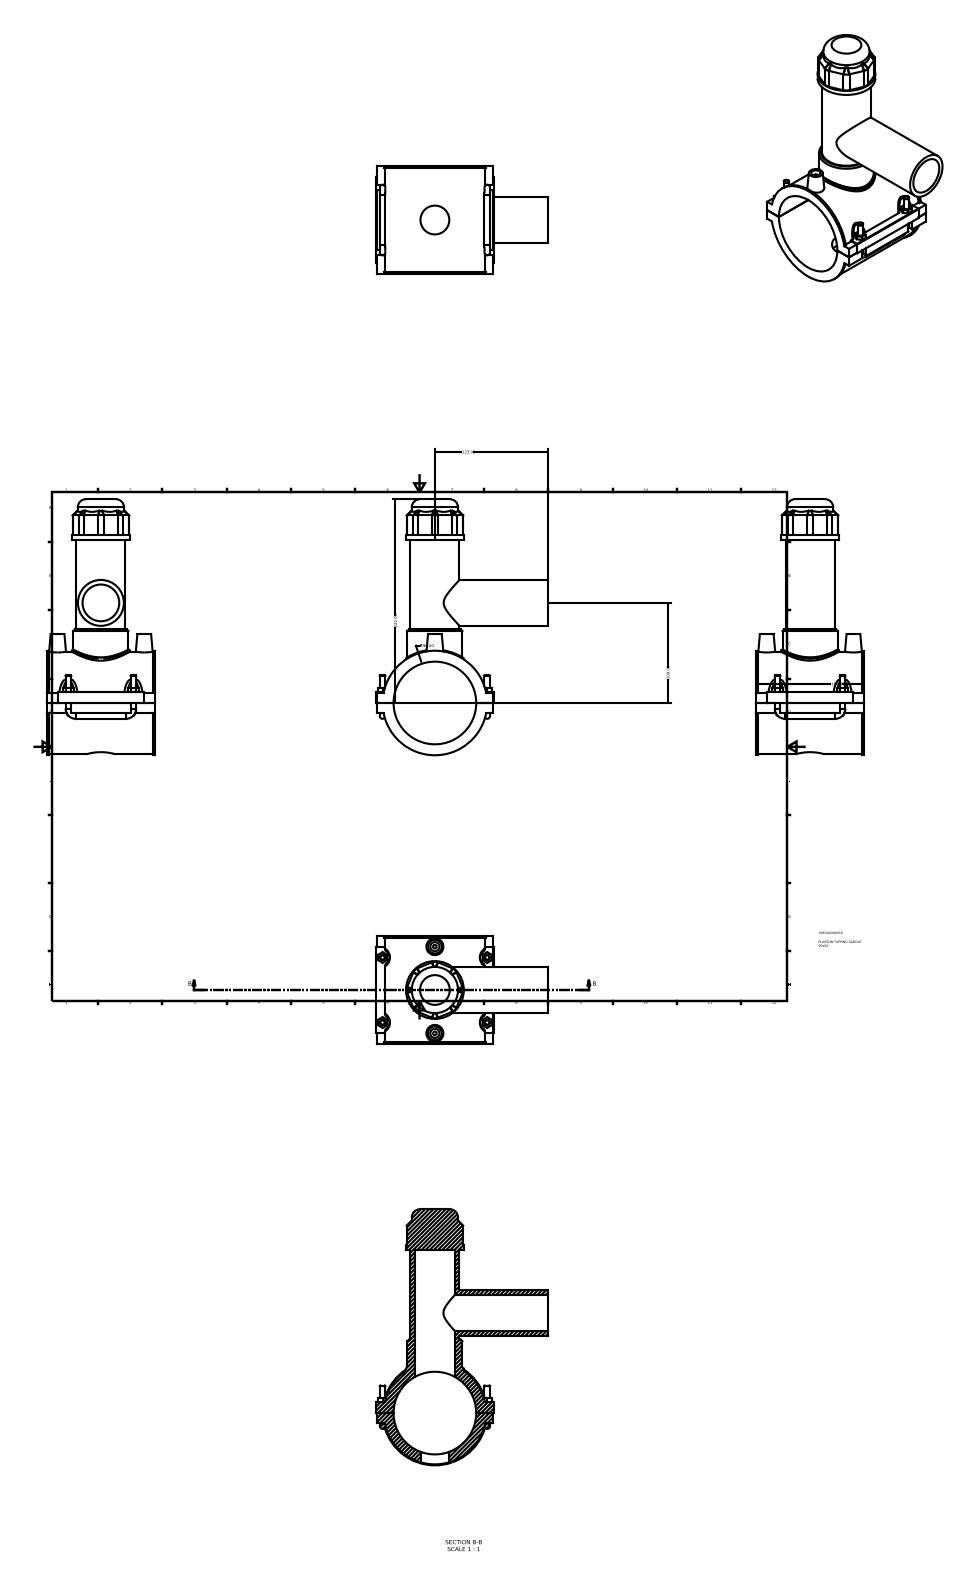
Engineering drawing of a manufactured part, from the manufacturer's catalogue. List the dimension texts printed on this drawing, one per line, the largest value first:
222.00
123.00
118.00
109.00
∅90.00
